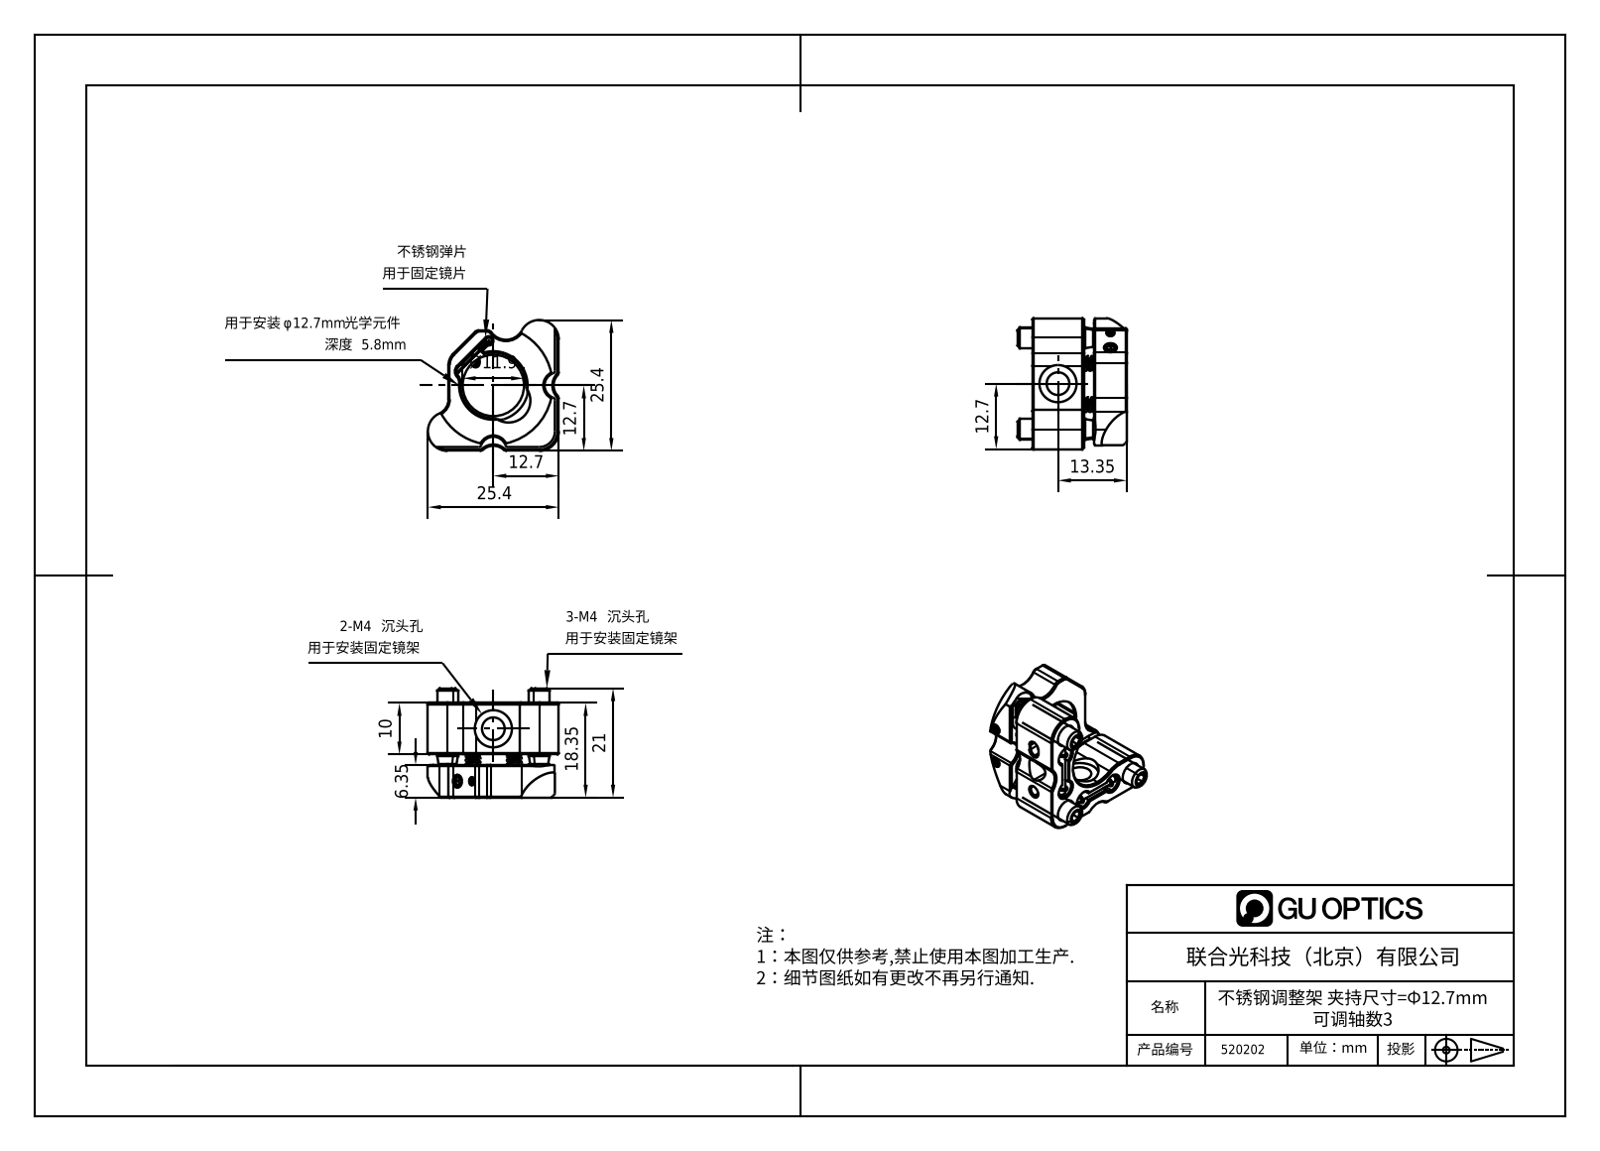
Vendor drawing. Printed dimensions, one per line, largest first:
25.4
25.4
21
18.35
13.35
12.7
12.7
12.7
Ø11.9
10
6.35
